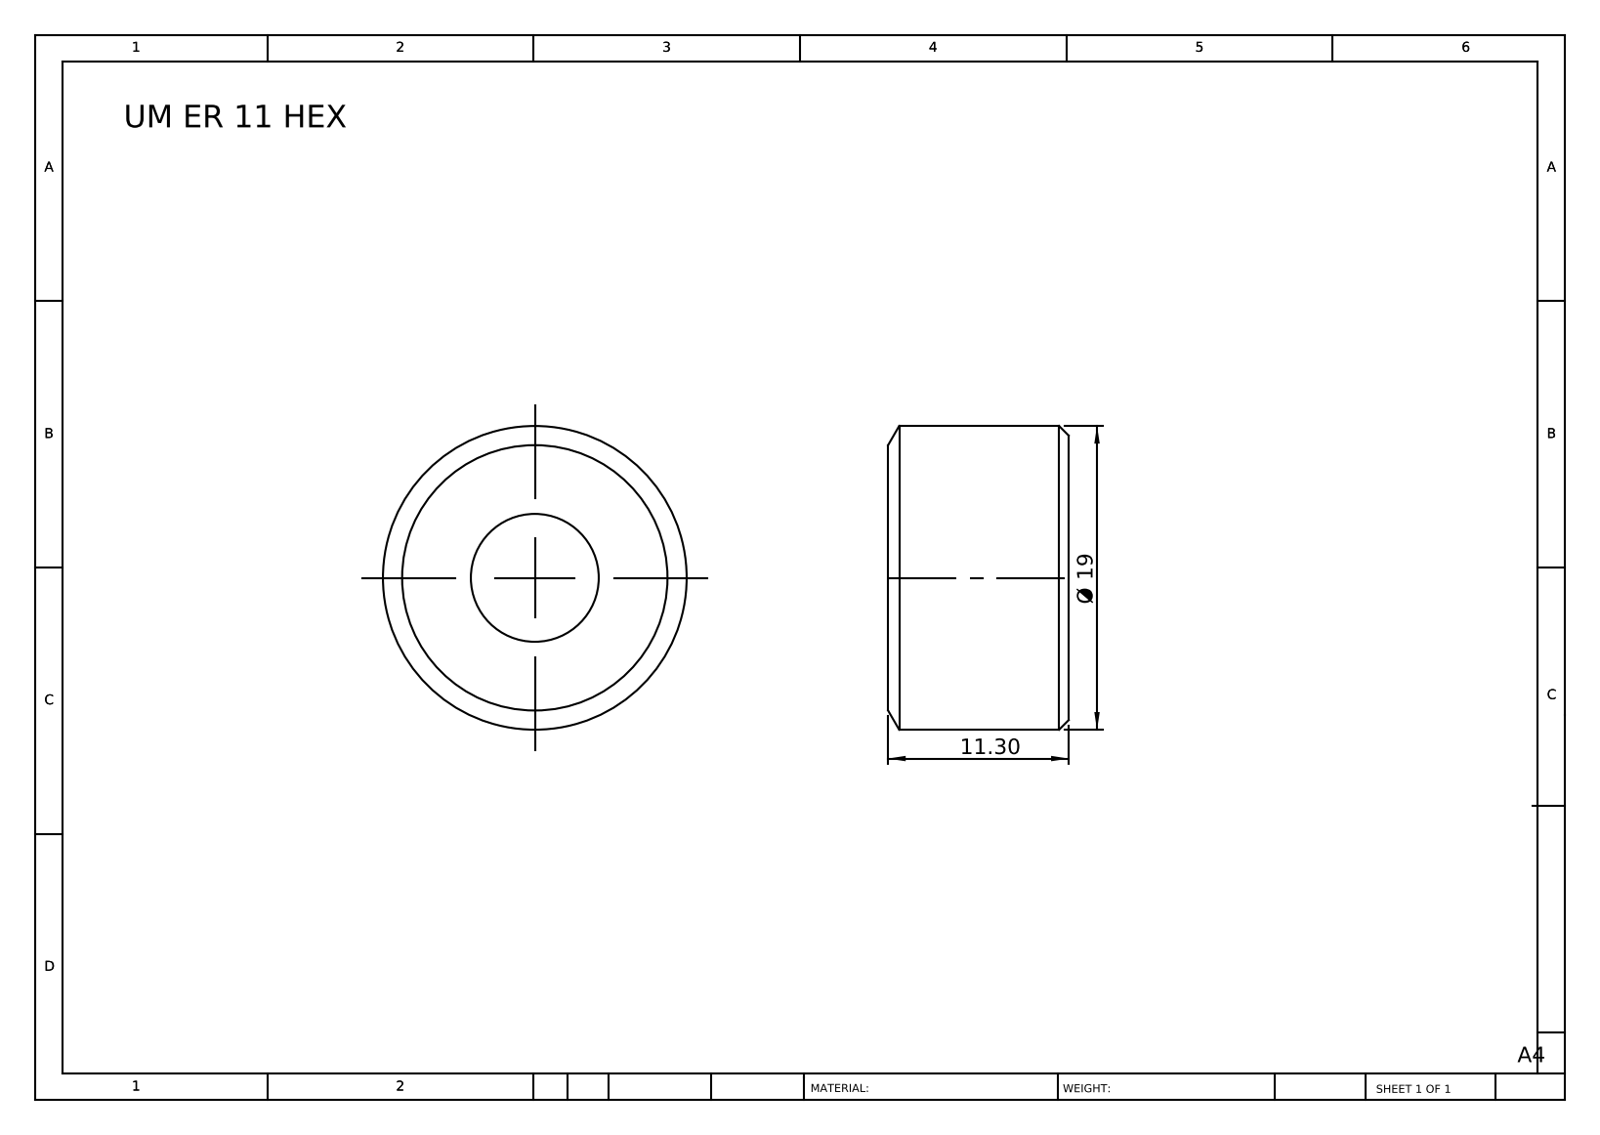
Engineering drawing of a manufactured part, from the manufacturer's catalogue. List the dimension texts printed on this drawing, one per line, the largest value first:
Ø 19
11.30
